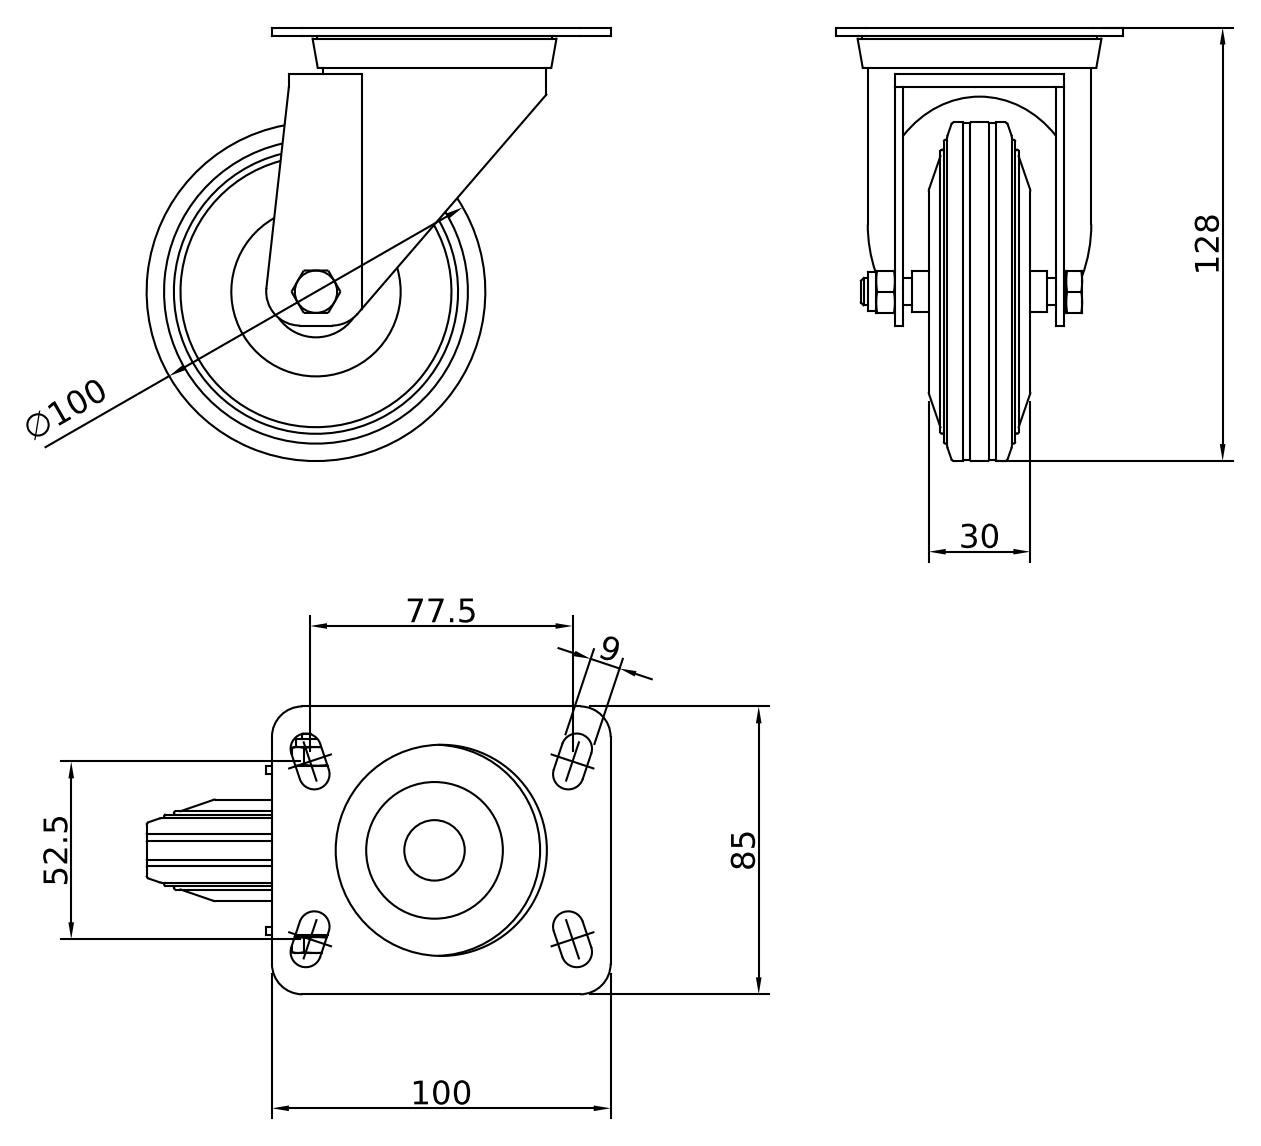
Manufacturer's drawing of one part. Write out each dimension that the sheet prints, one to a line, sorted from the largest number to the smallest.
128
∅100
100
85
77.5
52.5
30
9
